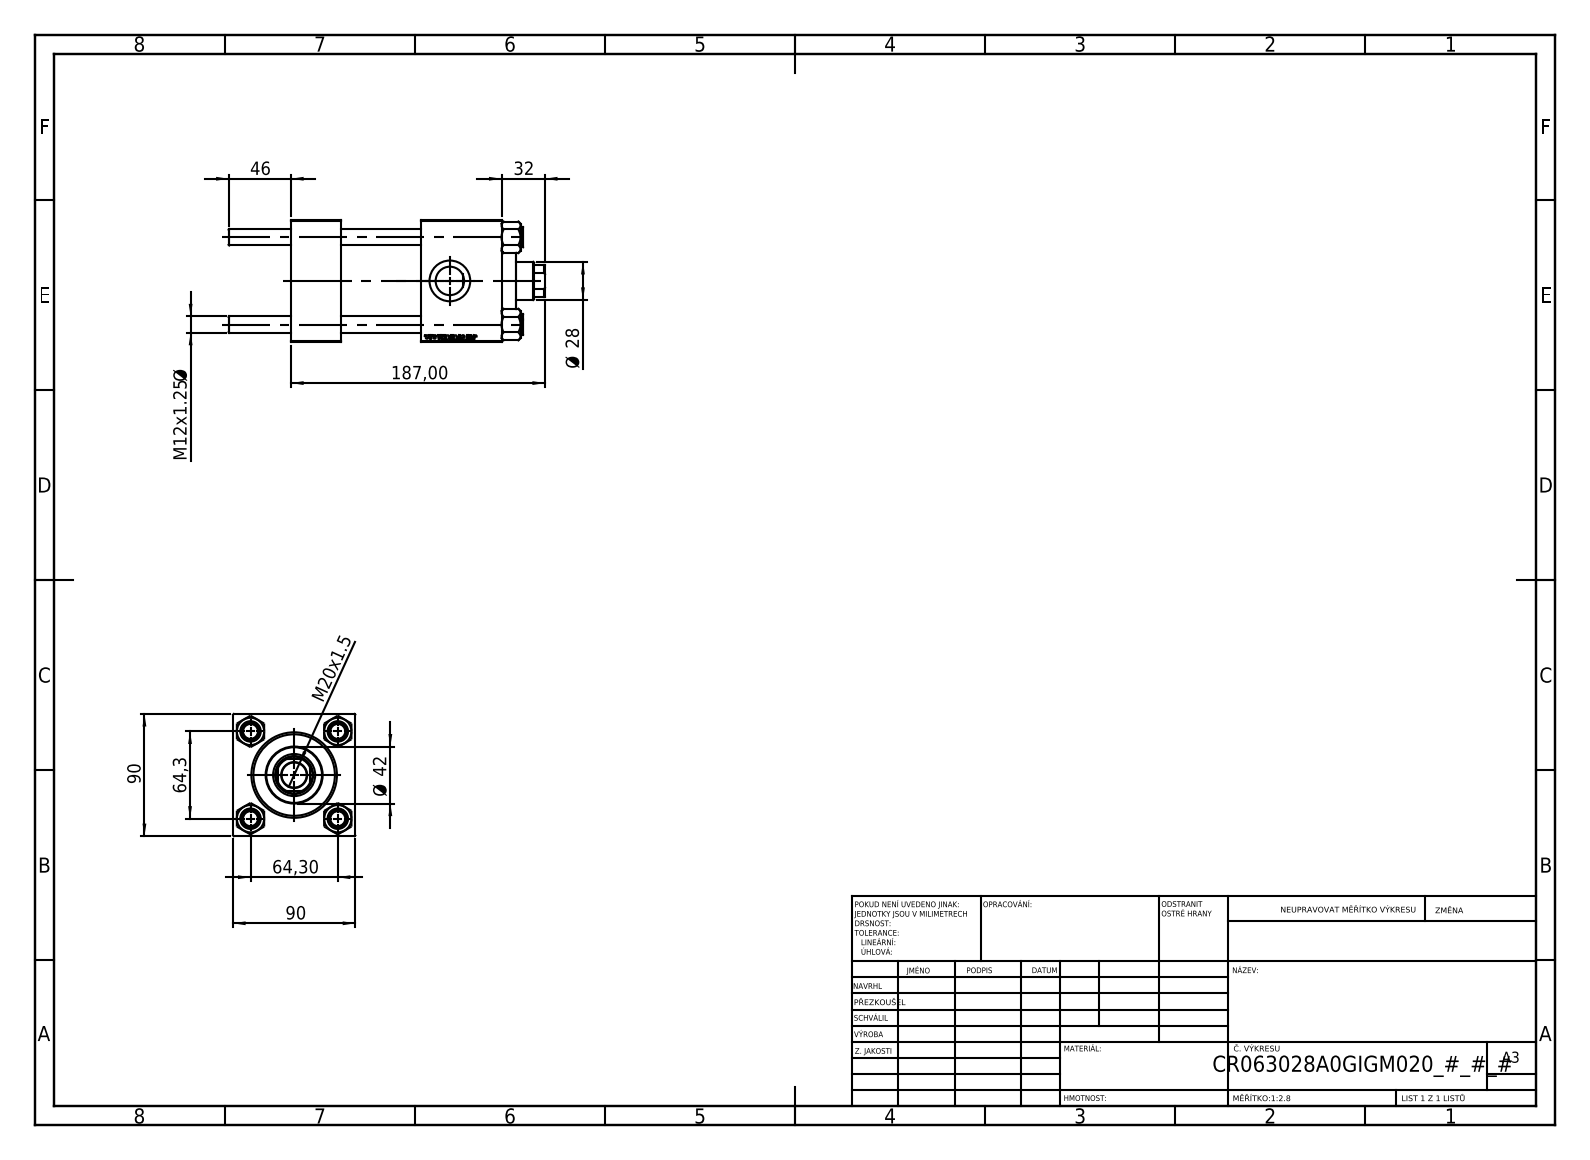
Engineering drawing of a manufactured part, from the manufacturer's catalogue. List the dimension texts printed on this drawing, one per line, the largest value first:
187,00
90
90
64,3
64,30
46
Ø 42
32
Ø 28
M20x1.5
M12x1.25 Ø
